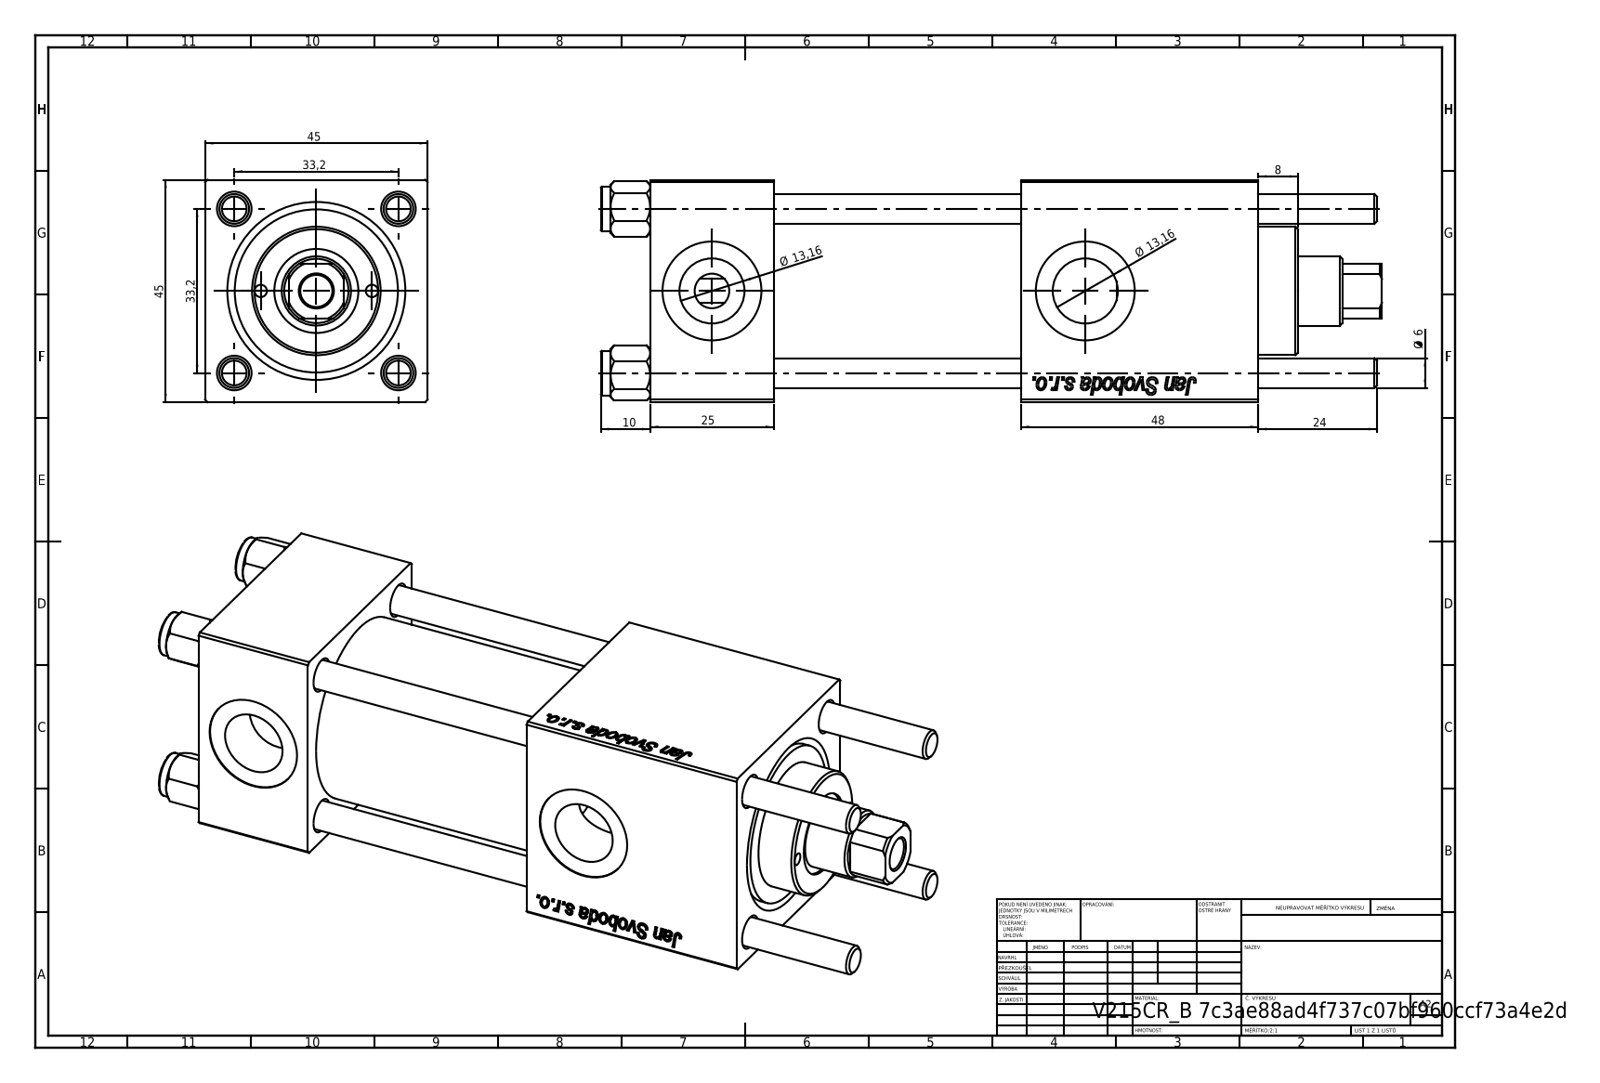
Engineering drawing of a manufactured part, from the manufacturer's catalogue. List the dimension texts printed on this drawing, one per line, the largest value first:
48
45
45
33,2
33,2
25
24
Ø 13,16
Ø 13,16
10
8
Ø 6
